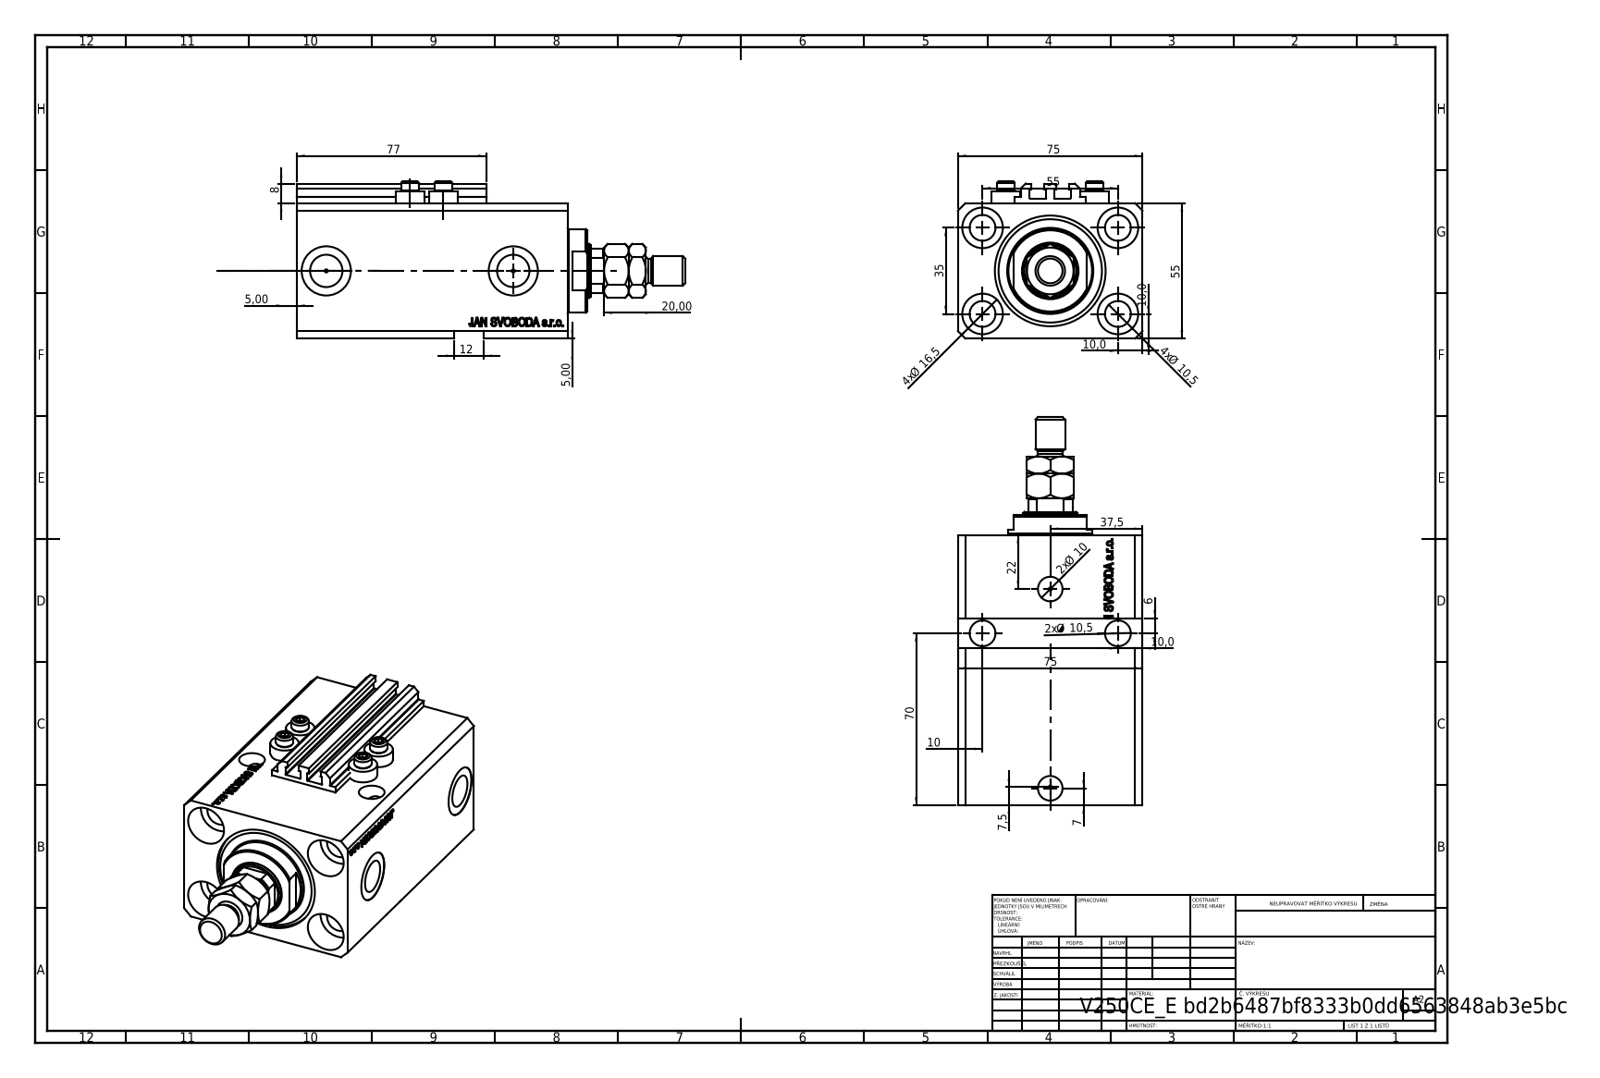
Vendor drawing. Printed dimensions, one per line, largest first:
77
75
75
70
55
55
37,5
35
22
20,00
4x Ø 16,5
12
4x Ø 10,5
2x Ø 10,5
10,0
10,0
2x Ø 10
10,0
10
8
7,5
7
6
5,00
5,00
